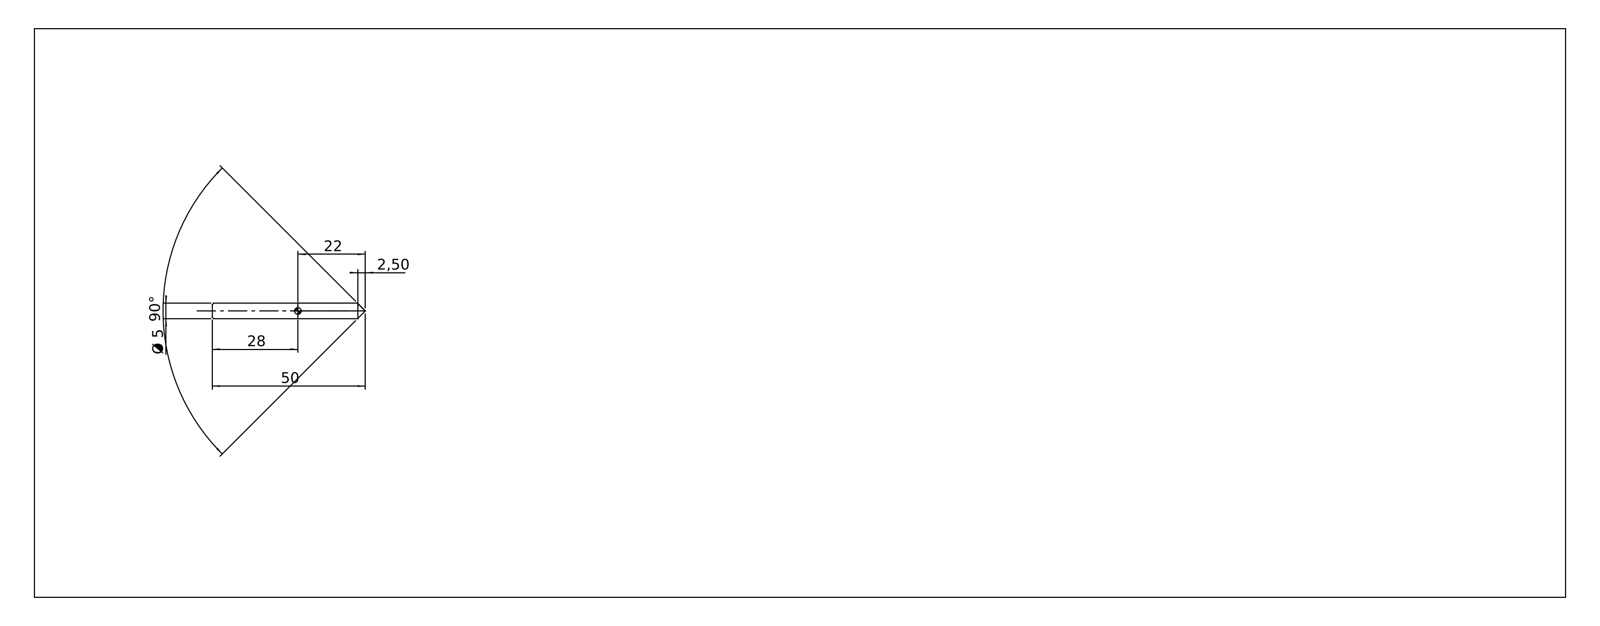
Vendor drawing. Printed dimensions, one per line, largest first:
90°
50
28
22
Ø 5
2,50
